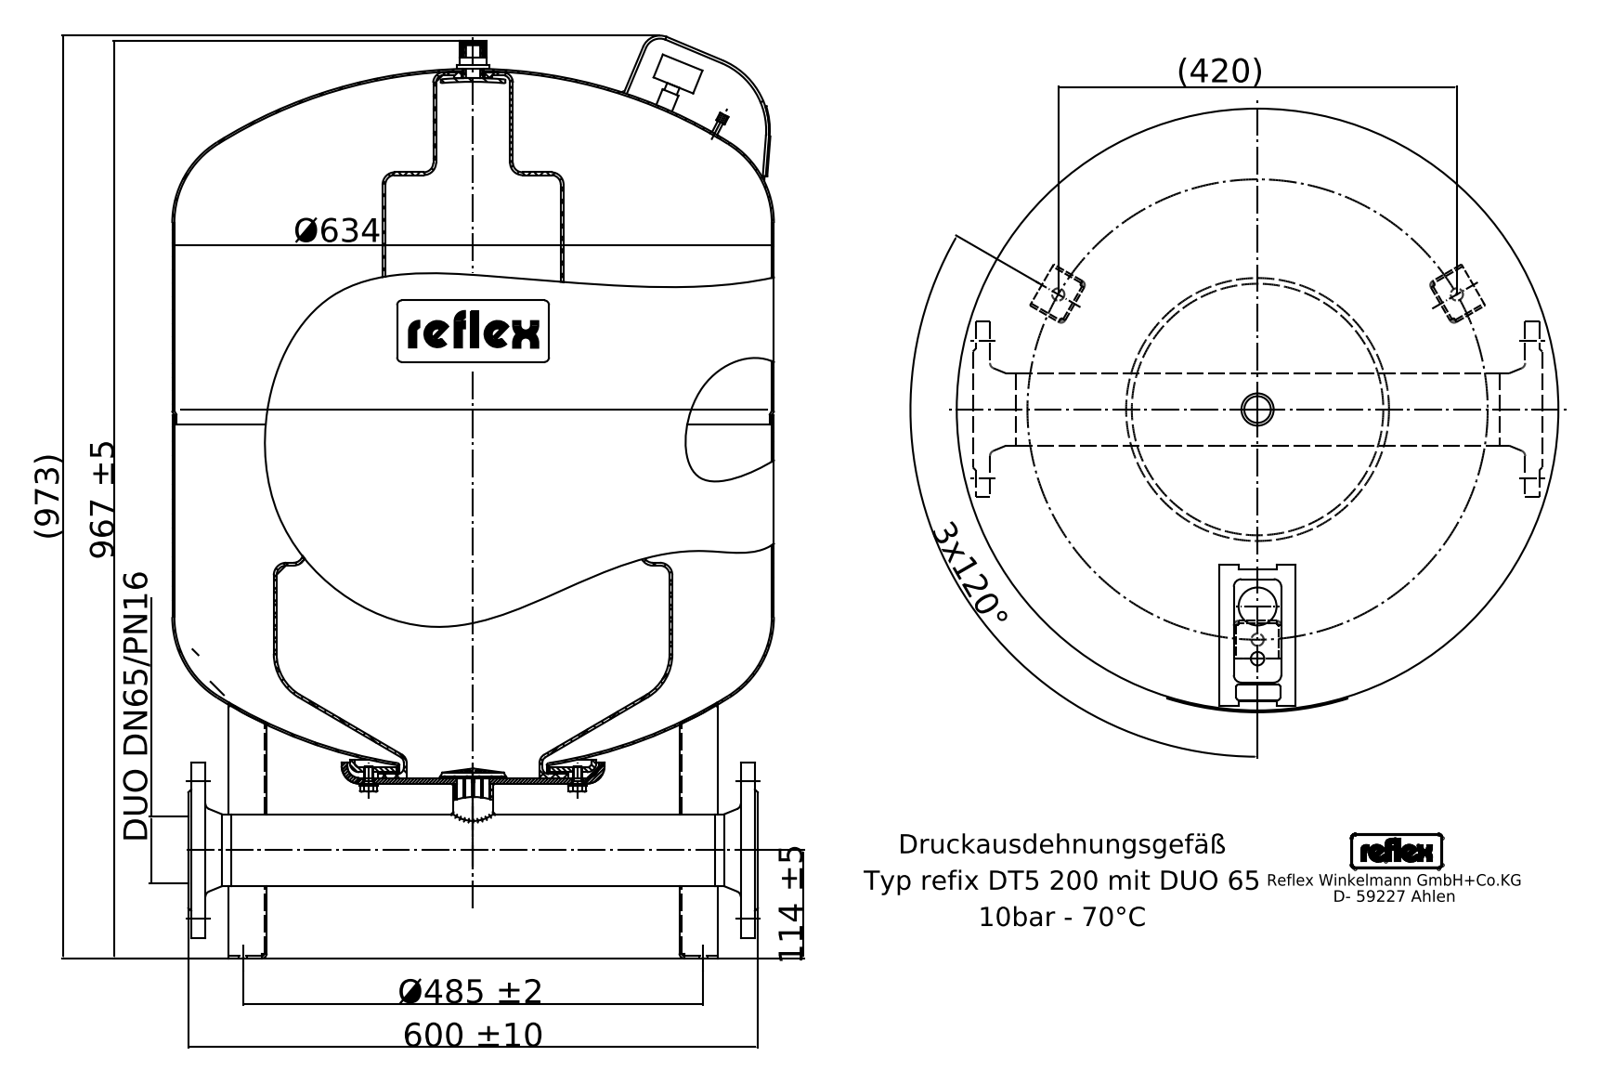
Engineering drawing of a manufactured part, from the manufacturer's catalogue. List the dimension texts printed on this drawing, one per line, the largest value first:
(973)
967 ±5
Ø634
600 ±10
Ø485 ±2
(420)
3x120°
114 ±5
DUO DN65/PN16
